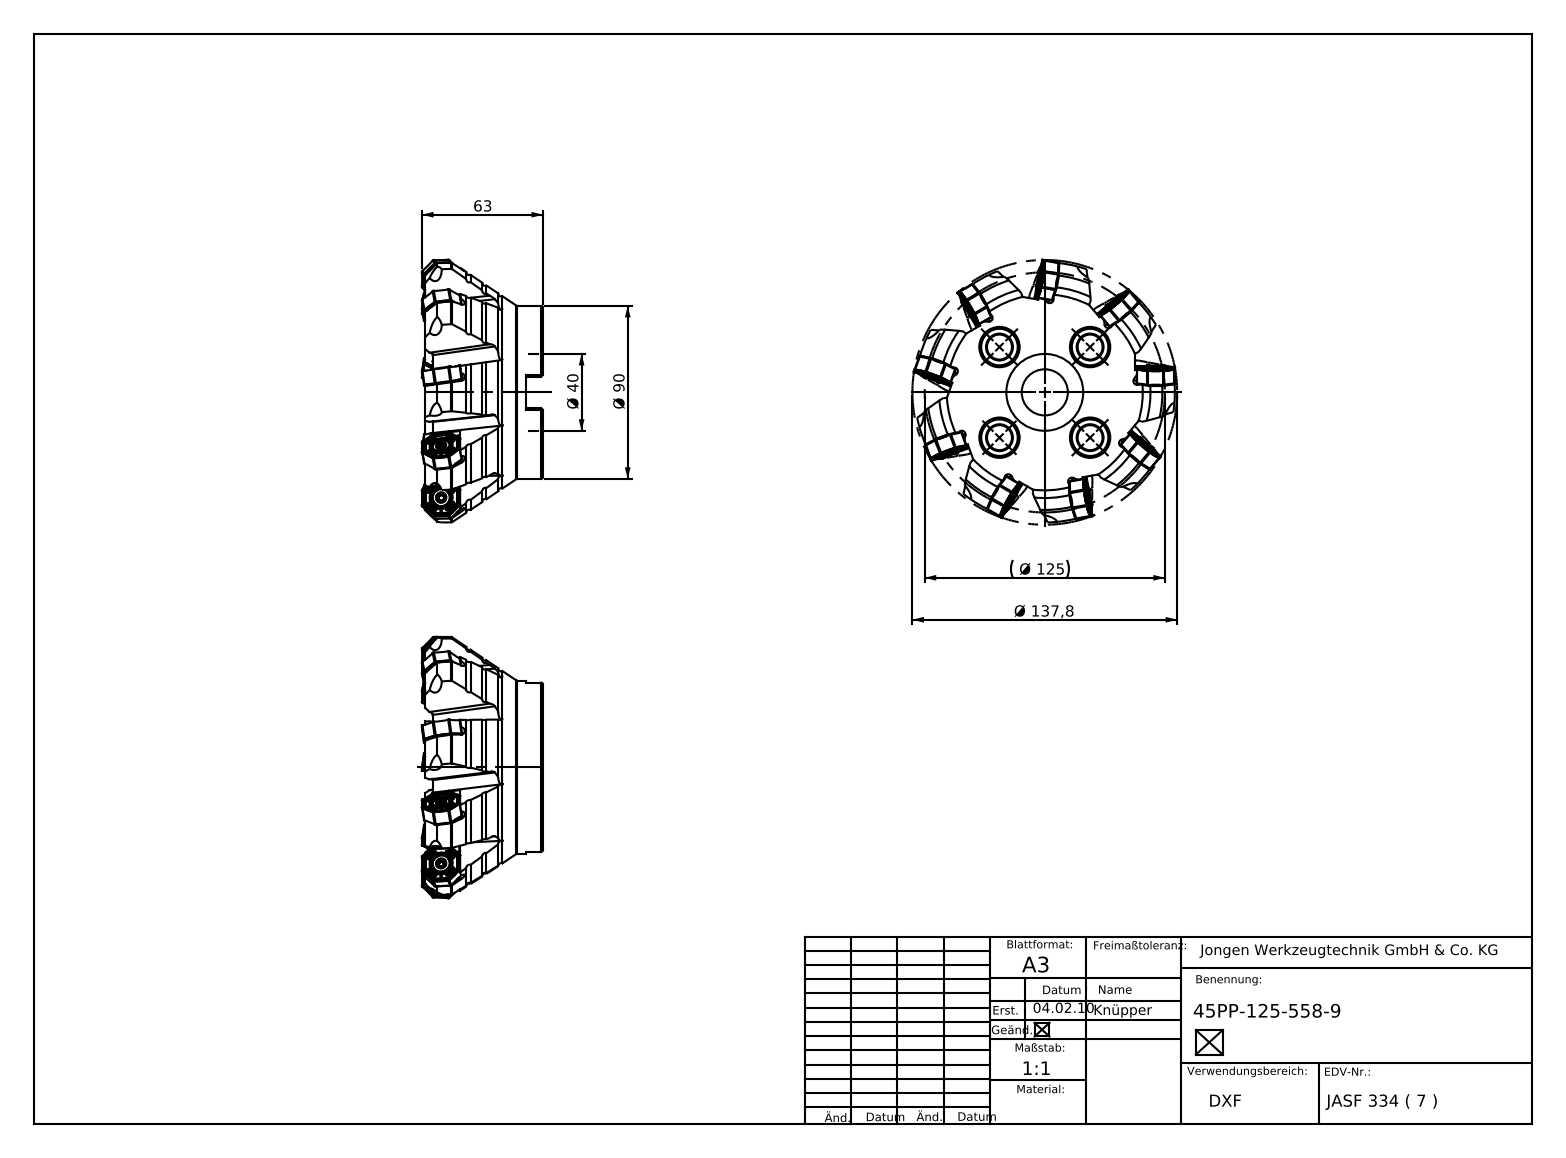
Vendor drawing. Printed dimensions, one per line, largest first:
Ø 137,8
Ø 125
Ø 90
63
Ø 40
